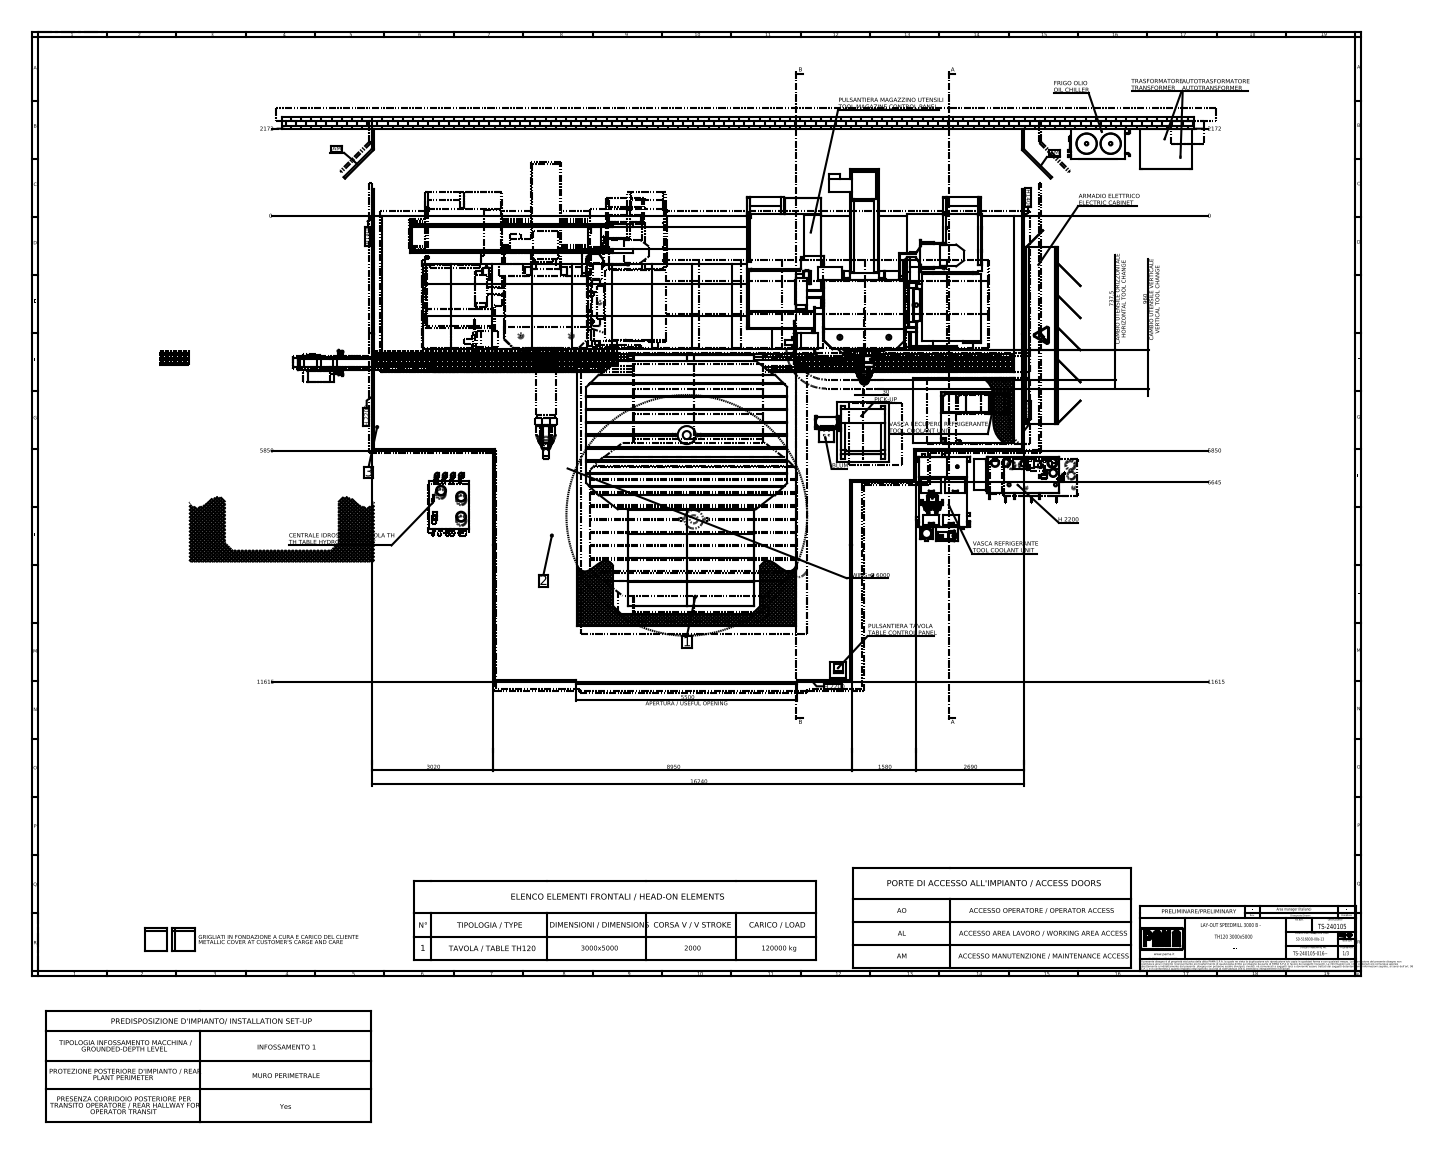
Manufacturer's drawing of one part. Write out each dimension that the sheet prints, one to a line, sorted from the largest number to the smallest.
16240
11615
11615
8950
6645
SWING= Ø 6000
5850
5850
5500 APERTURA / USEFUL OPENING
3020
2690
2172
2172
1580
960 CAMBIO UTENSILE VERTICALE VERTICAL TOOL CHANGE
737,5 CAMBIO UTENSILE ORIZZONTALE HORIZONTAL TOOL CHANGE
30
0
0
